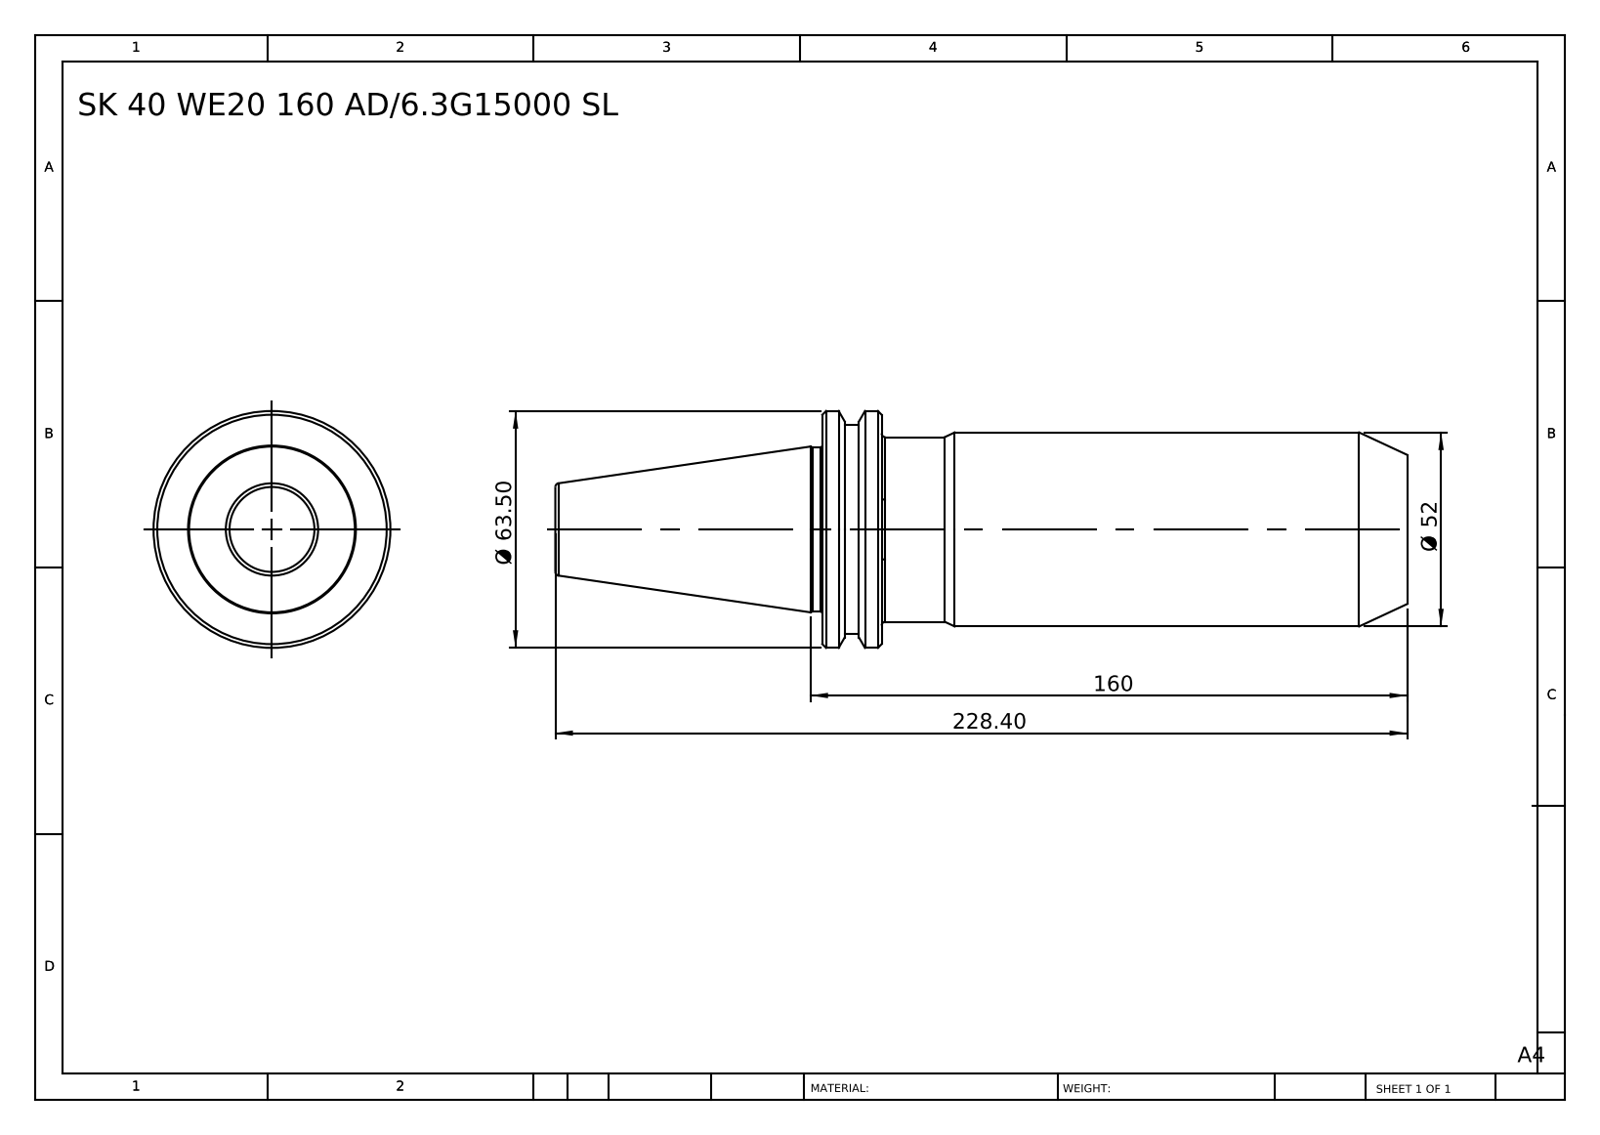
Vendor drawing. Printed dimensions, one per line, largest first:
228.40
160
Ø 63.50
Ø 52
